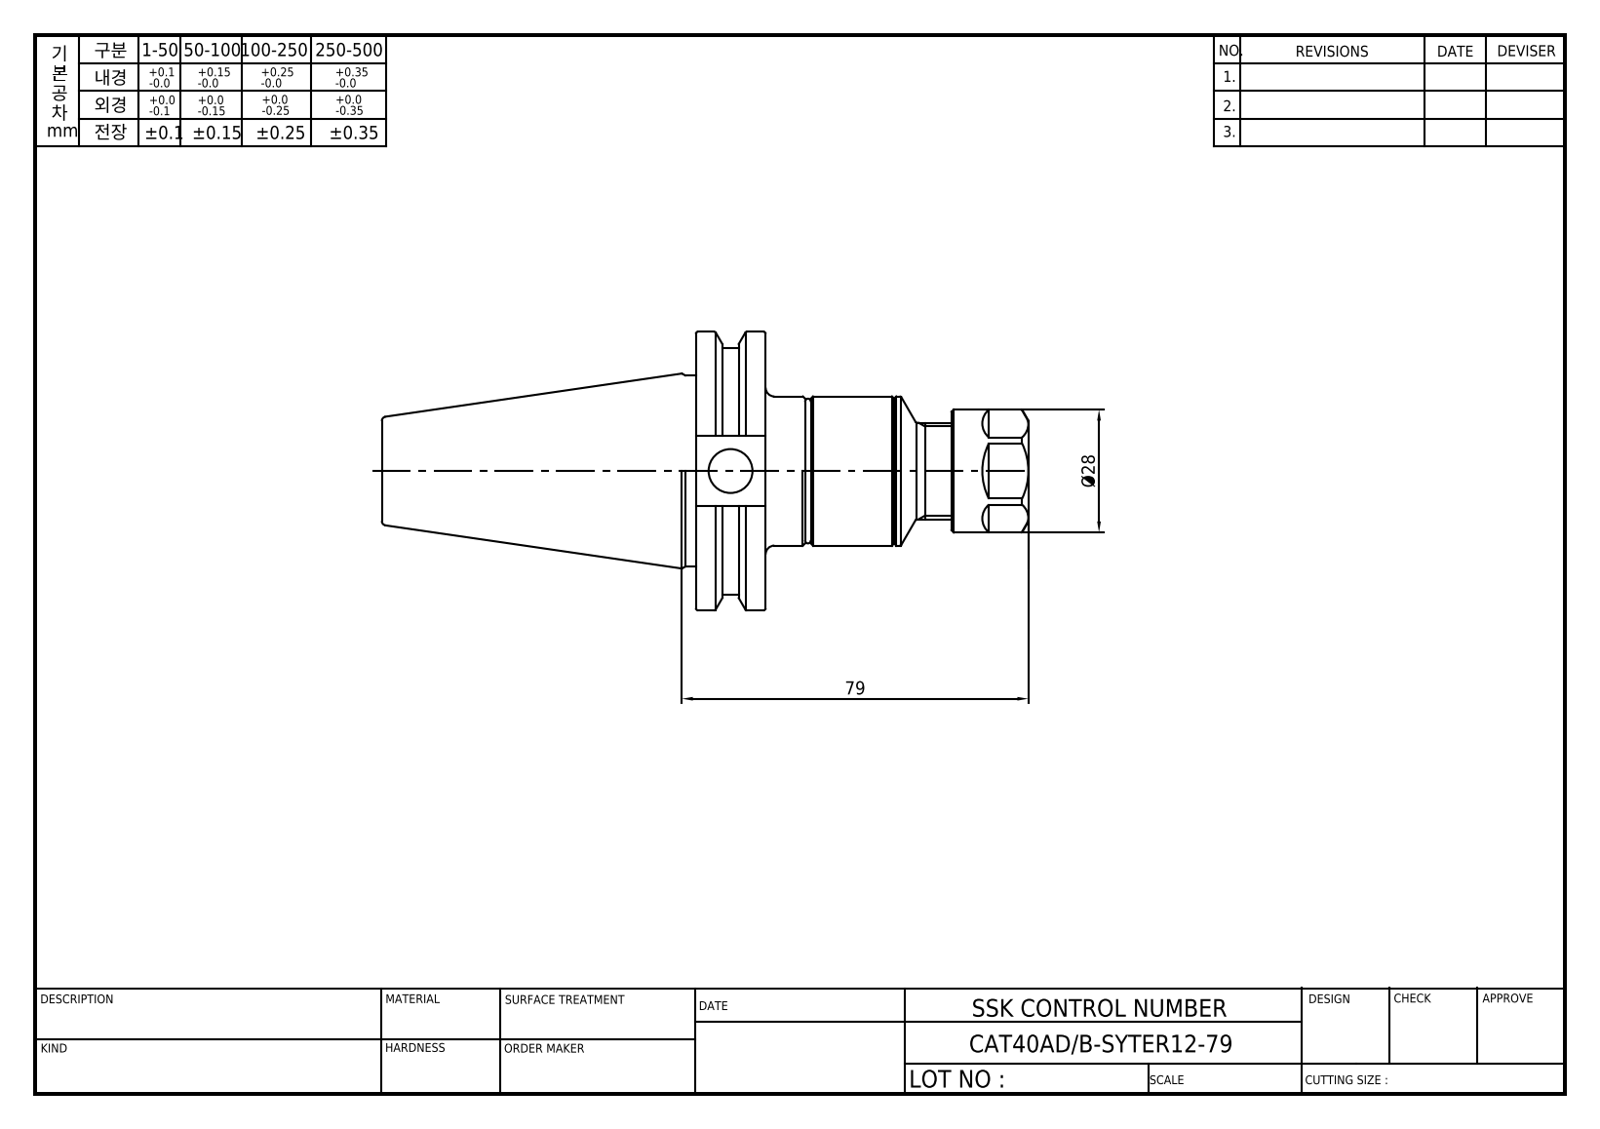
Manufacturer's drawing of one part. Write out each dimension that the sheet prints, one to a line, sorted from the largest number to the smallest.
79
Ø28
